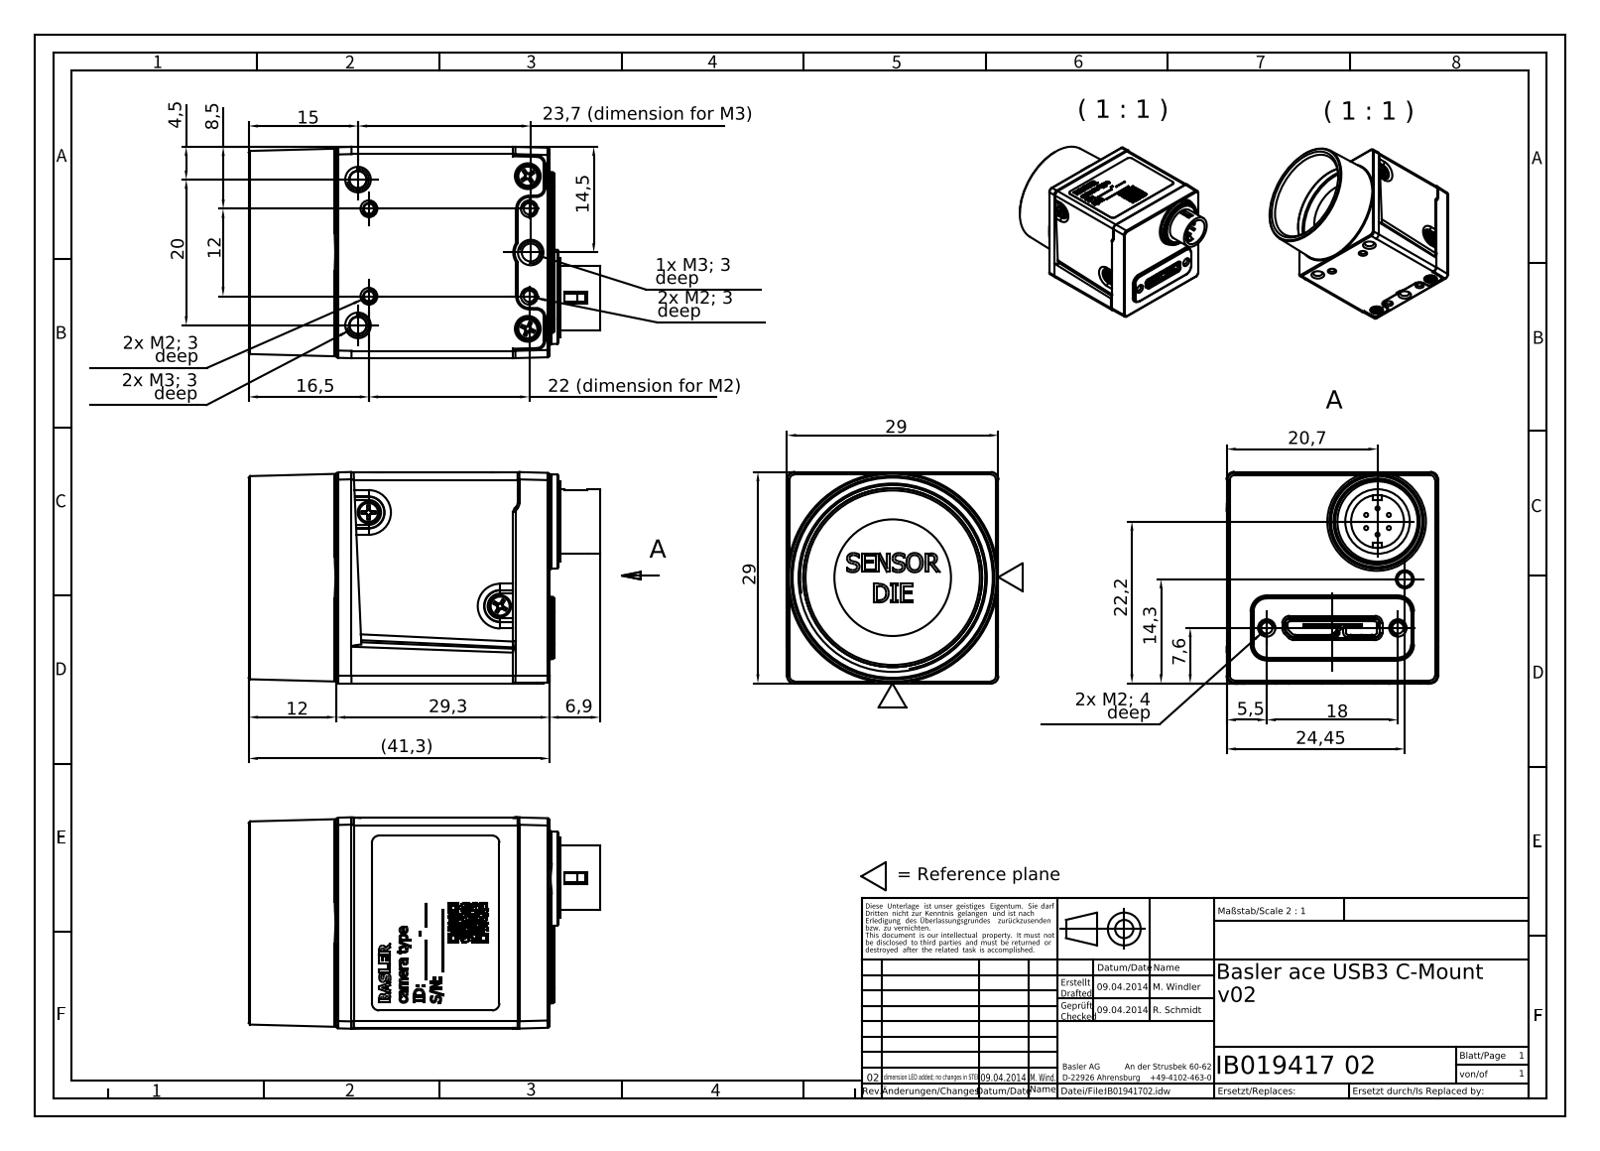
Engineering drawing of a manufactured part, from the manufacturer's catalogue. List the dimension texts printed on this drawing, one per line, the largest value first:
(41,3)
29,3
29
29
24,45
23,7 (dimension for M3)
22,2
22 (dimension for M2)
20,7
20
18
16,5
15
14,5
14,3
12
12
8,5
7,6
6,9
5,5
4,5
